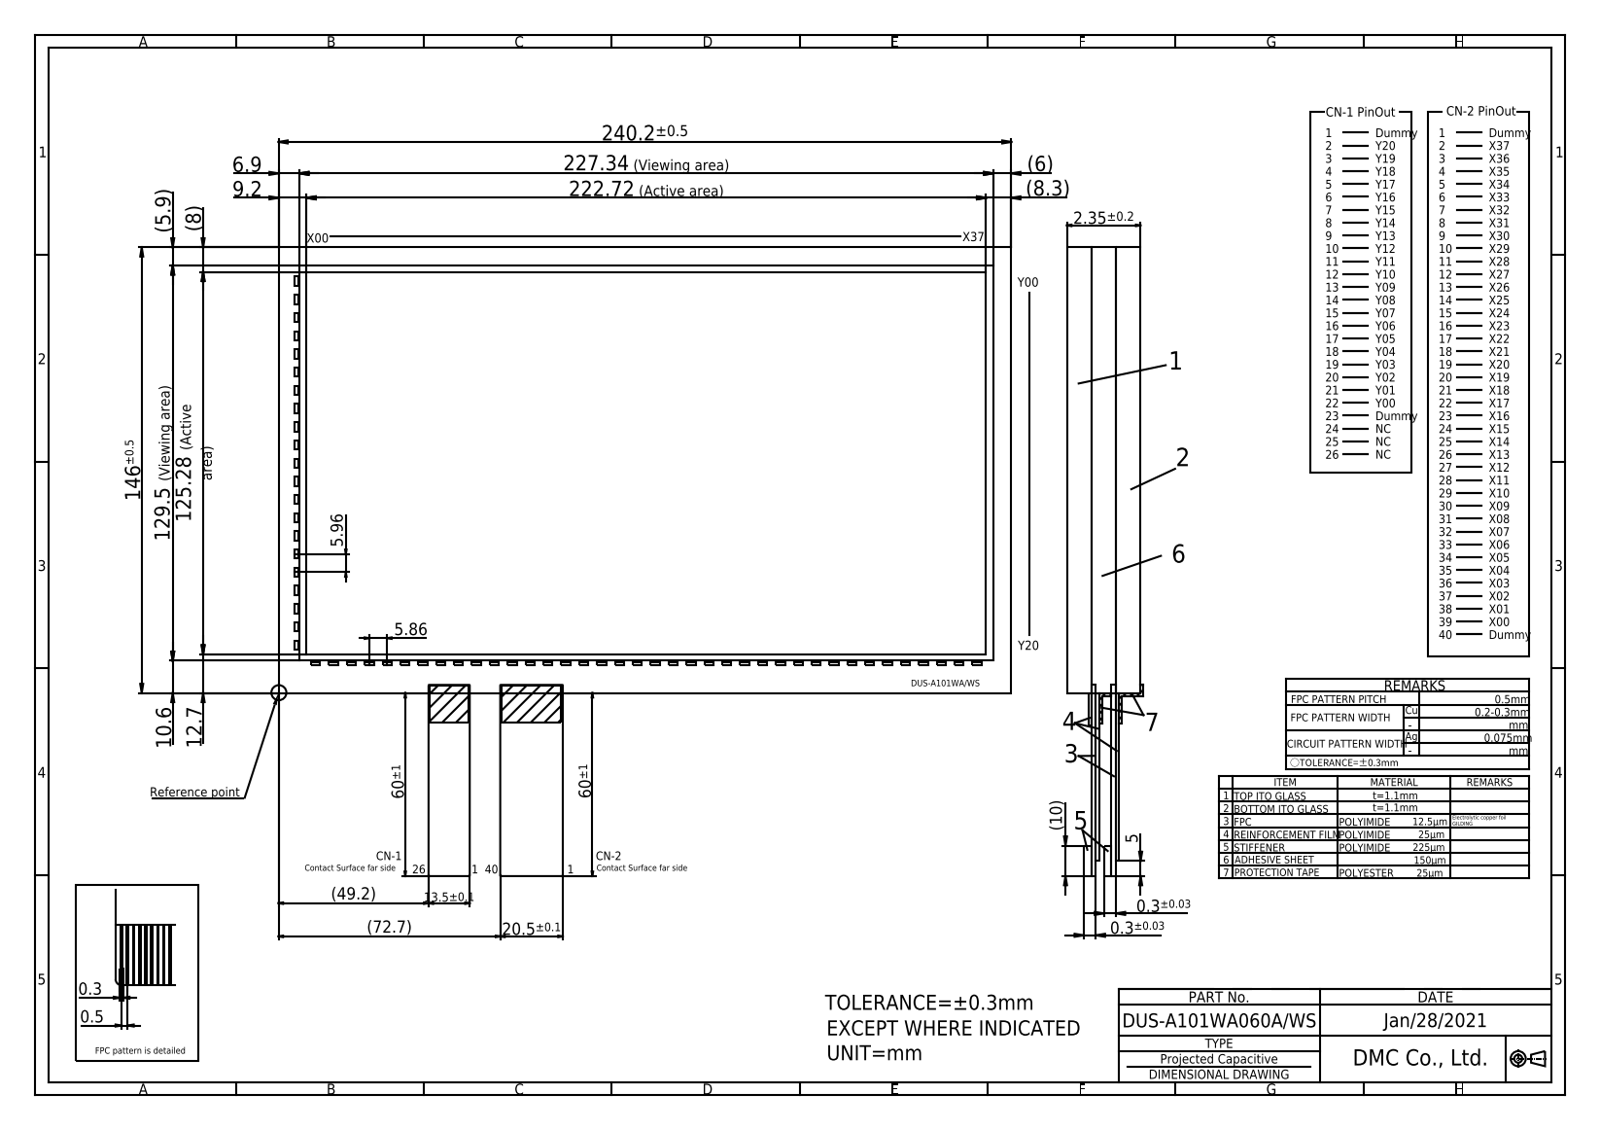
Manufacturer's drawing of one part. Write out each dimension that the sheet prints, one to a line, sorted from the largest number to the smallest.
240.2±0.5
227.34 (Viewing area)
222.72 (Active area)
146±0.5
129.5 (Viewing area)
125.28 (Active area)
(72.7)
60±1
60±1
(49.2)
20.5±0.1
13.5±0.1
12.7
10.6
(10)
9.2
(8.3)
(8)
6.9
(6)
5.96
(5.9)
5.86
5
2.35±0.2
0.5
0.3±0.03
0.3±0.03
0.3
